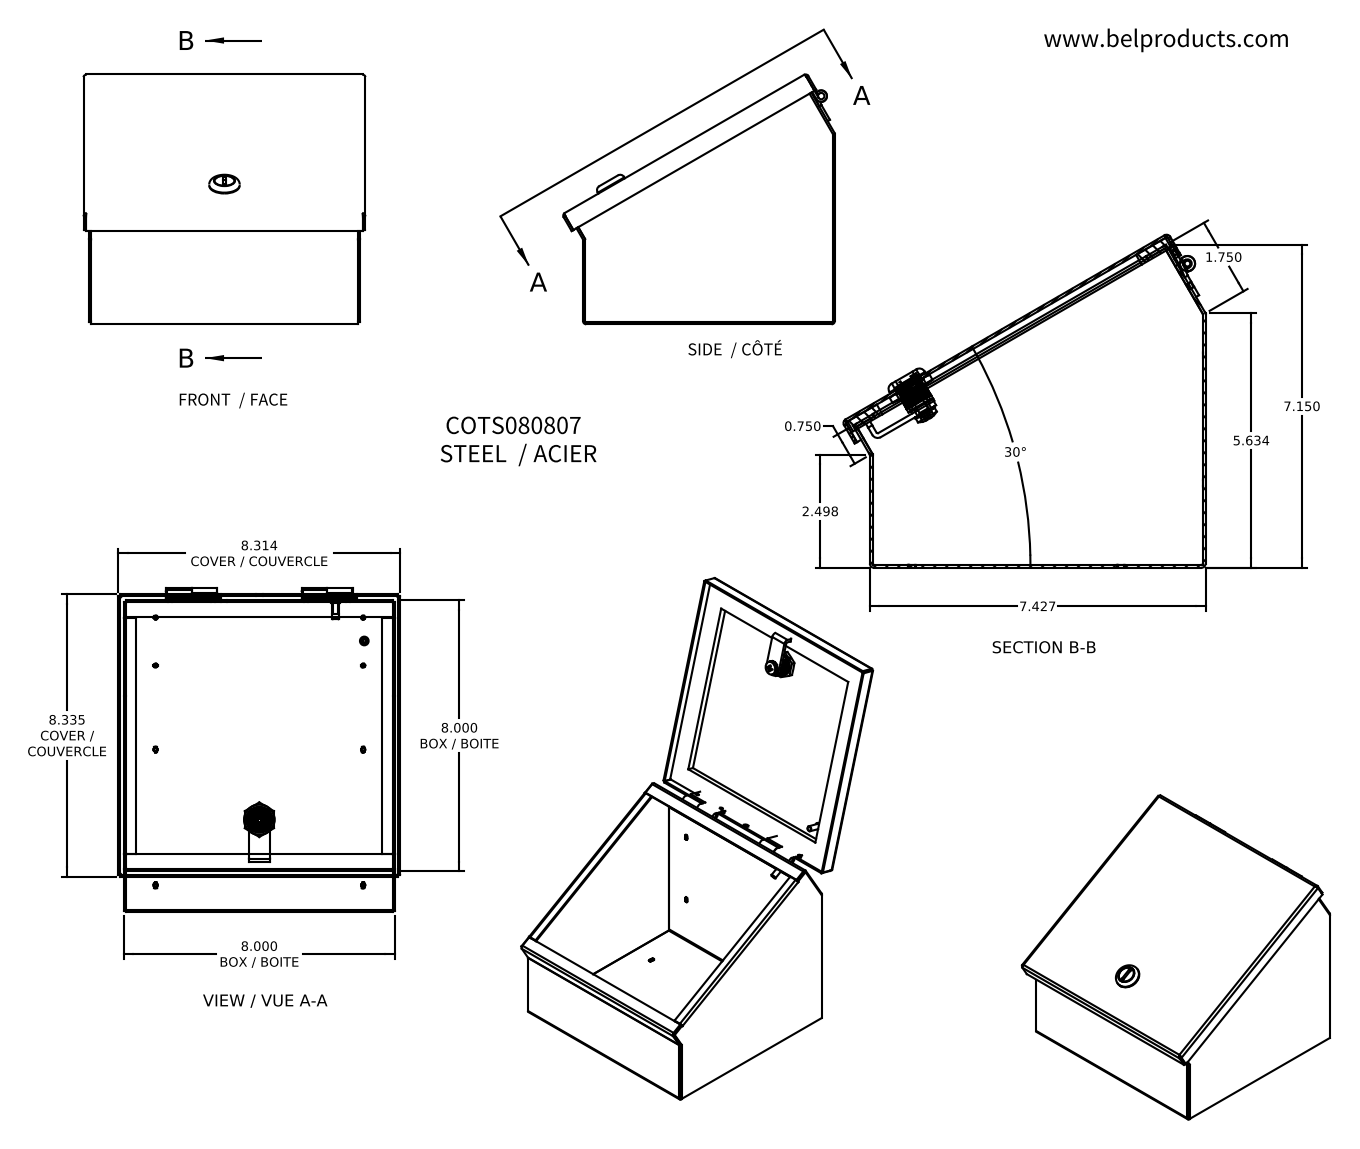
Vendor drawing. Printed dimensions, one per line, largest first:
30°
8.335 COVER / COUVERCLE
8.314 COVER / COUVERCLE
8.000 BOX / BOITE
8.000 BOX / BOITE
7.427
7.150
5.634
2.498
1.750
0.750
